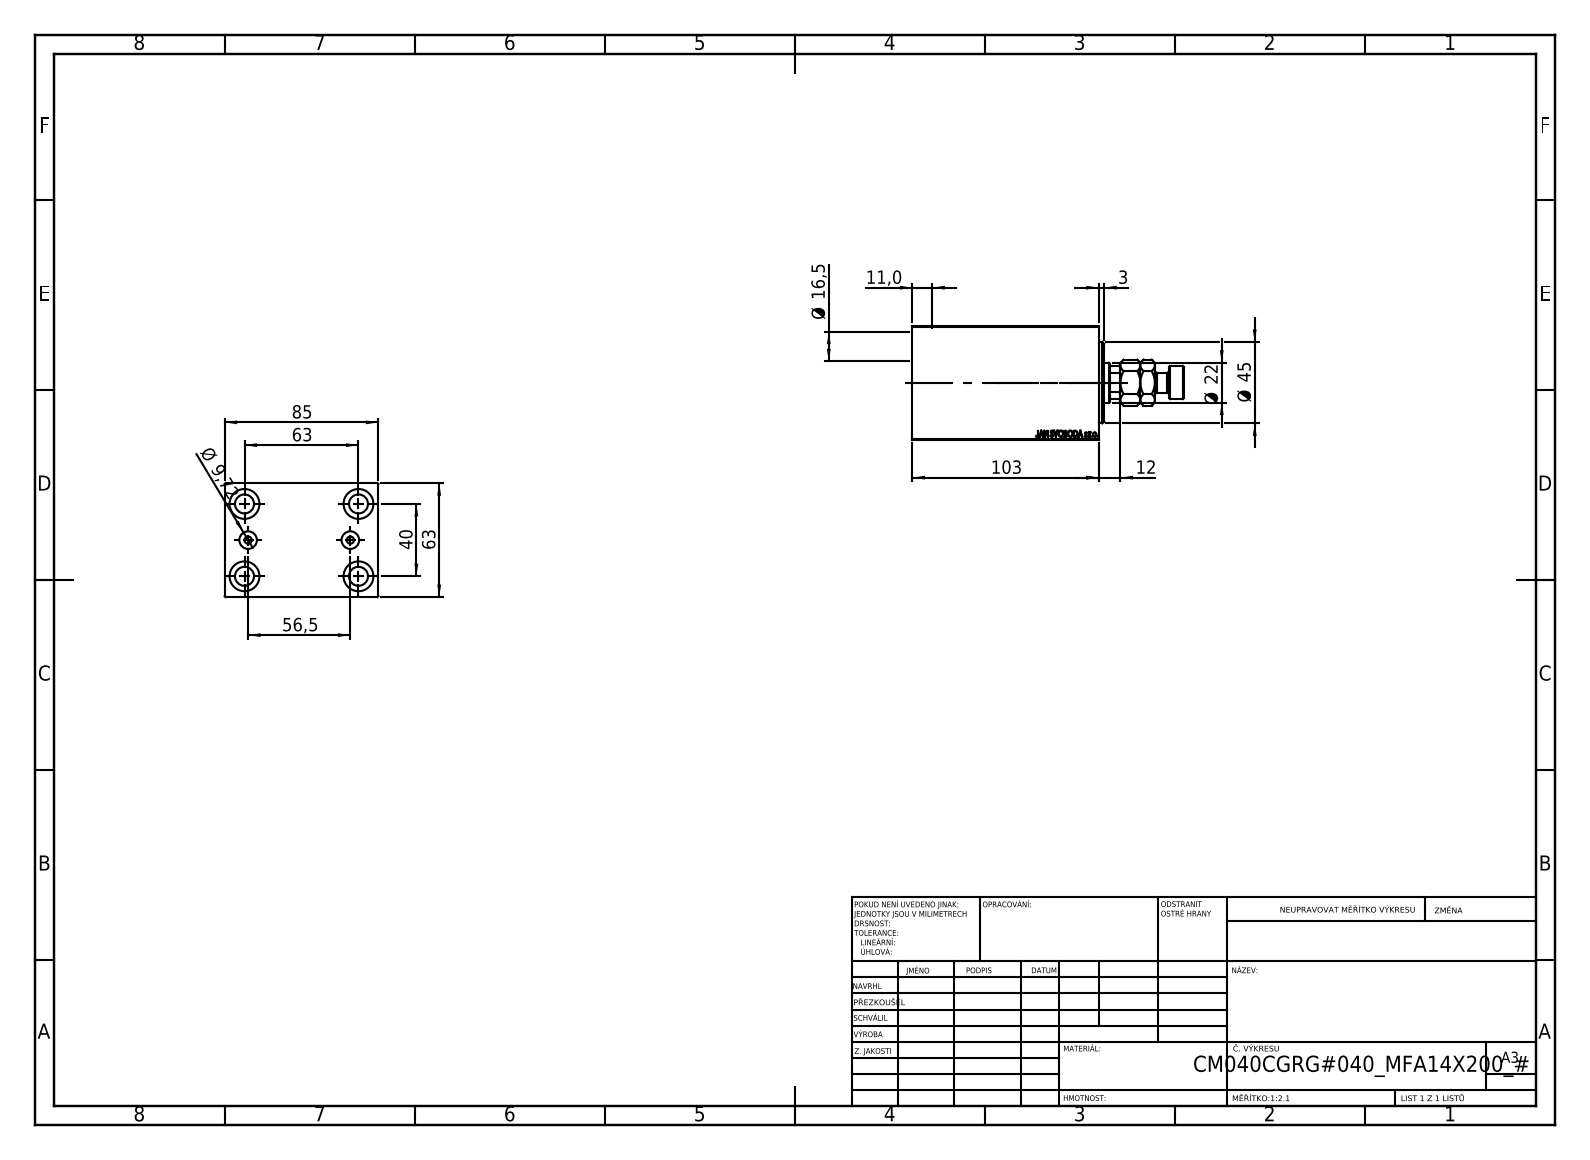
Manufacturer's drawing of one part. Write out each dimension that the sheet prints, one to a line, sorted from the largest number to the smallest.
103
85
63
63
56,5
Ø 45
40
Ø 22
Ø 16,5
12
11,0
Ø 9,72
3
